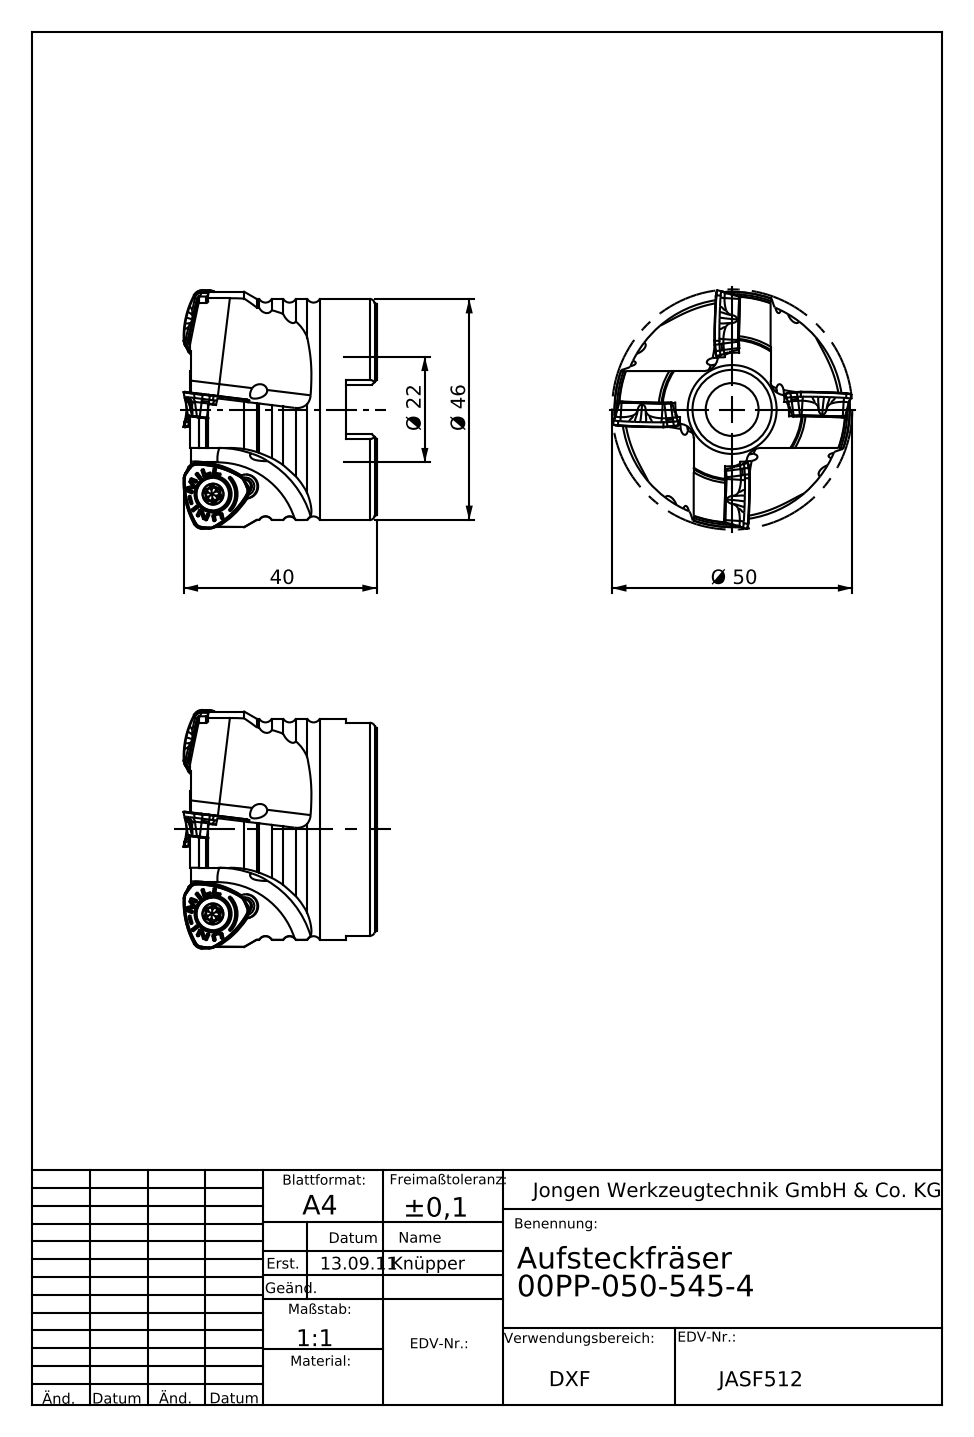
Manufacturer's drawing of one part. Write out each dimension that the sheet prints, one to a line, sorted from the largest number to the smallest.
Ø 50
Ø 46
40
Ø 22
